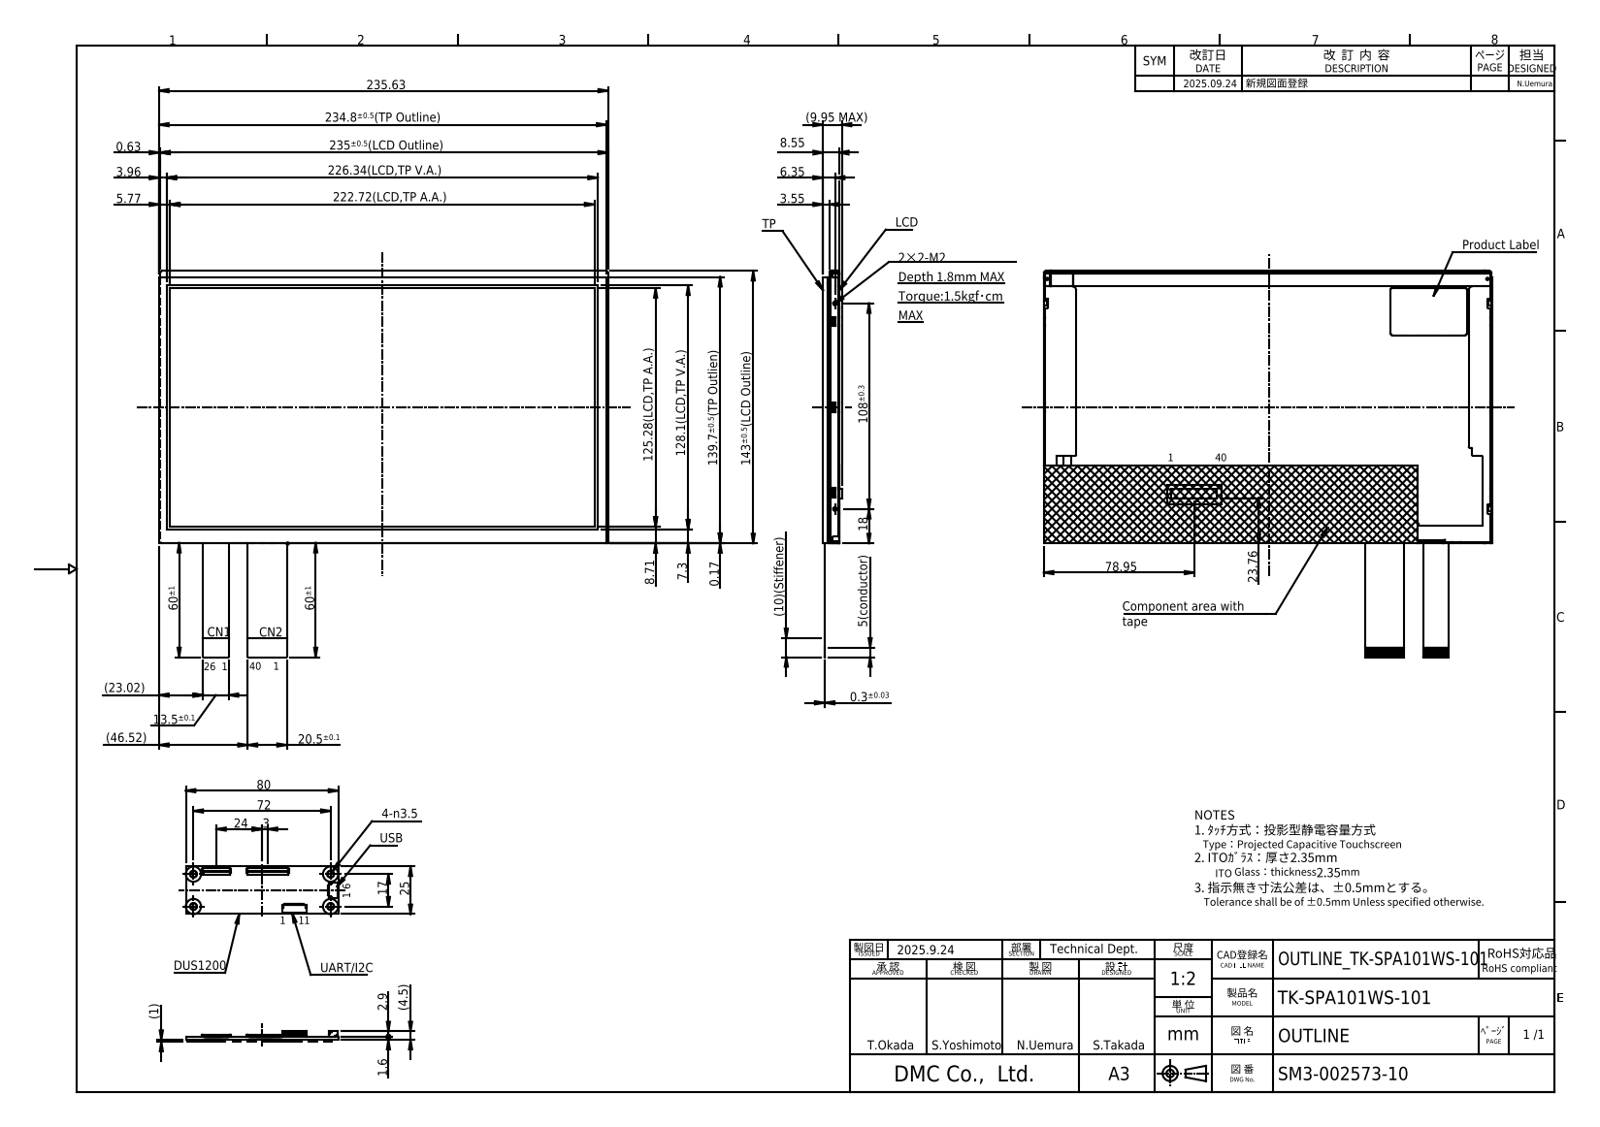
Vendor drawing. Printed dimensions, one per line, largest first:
235.63
235±0.5(LCD Outline)
234.8±0.5(TP Outline)
226.34(LCD,TP V.A.)
222.72(LCD,TP A.A.)
143±0.5(LCD Outline)
139.7±0.5(TP Outlien)
128.1(LCD,TP V.A.)
125.28(LCD,TP A.A.)
108±0.3
80
78.95
72
60±1
60±1
(46.52)
25
24
23.76
(23.02)
20.5±0.1
18
17
13.5±0.1
(10)(Stiffener)
(9.95 MAX)
8.71
7.3
6.35
5.77
5(conductor)
(4.5)
3.96
3.55
3
2.9
1.6
(1)
0.63
0.3±0.03
0.17
